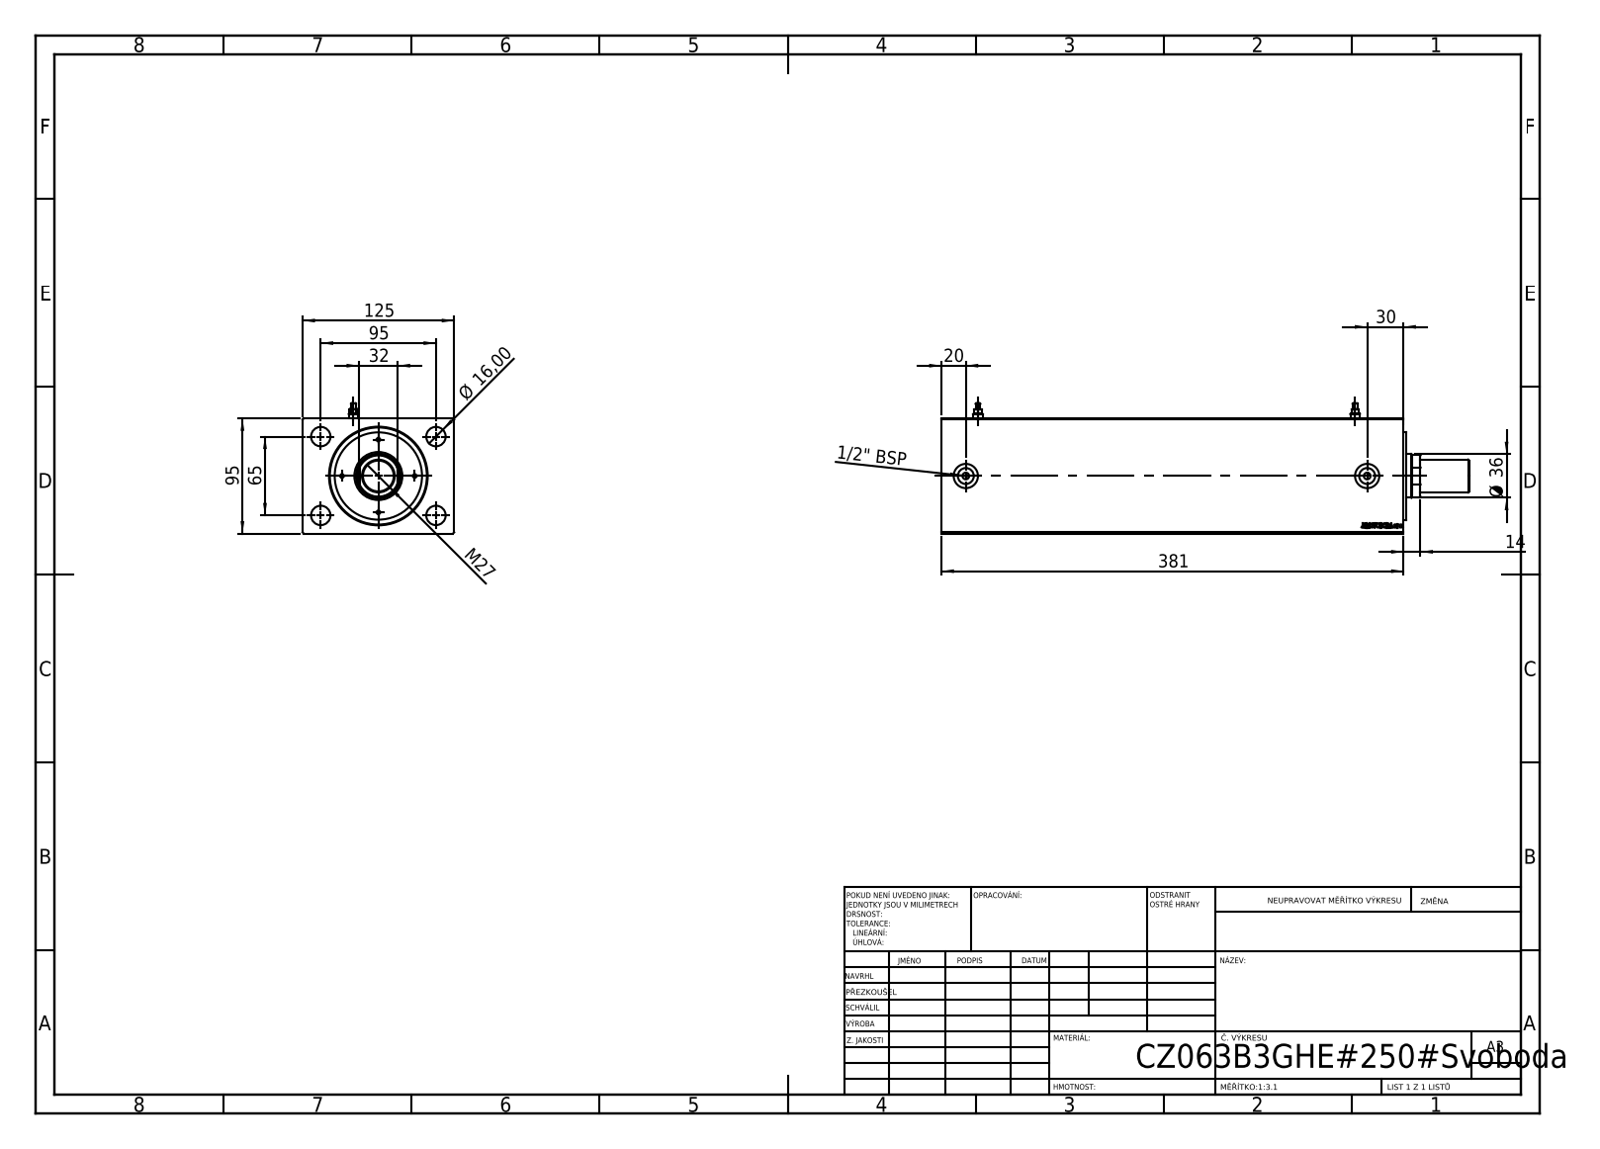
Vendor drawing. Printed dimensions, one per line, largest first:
381
125
95
95
65
Ø 36
32
30
M27
20
Ø 16,00
14
1/2" BSP
